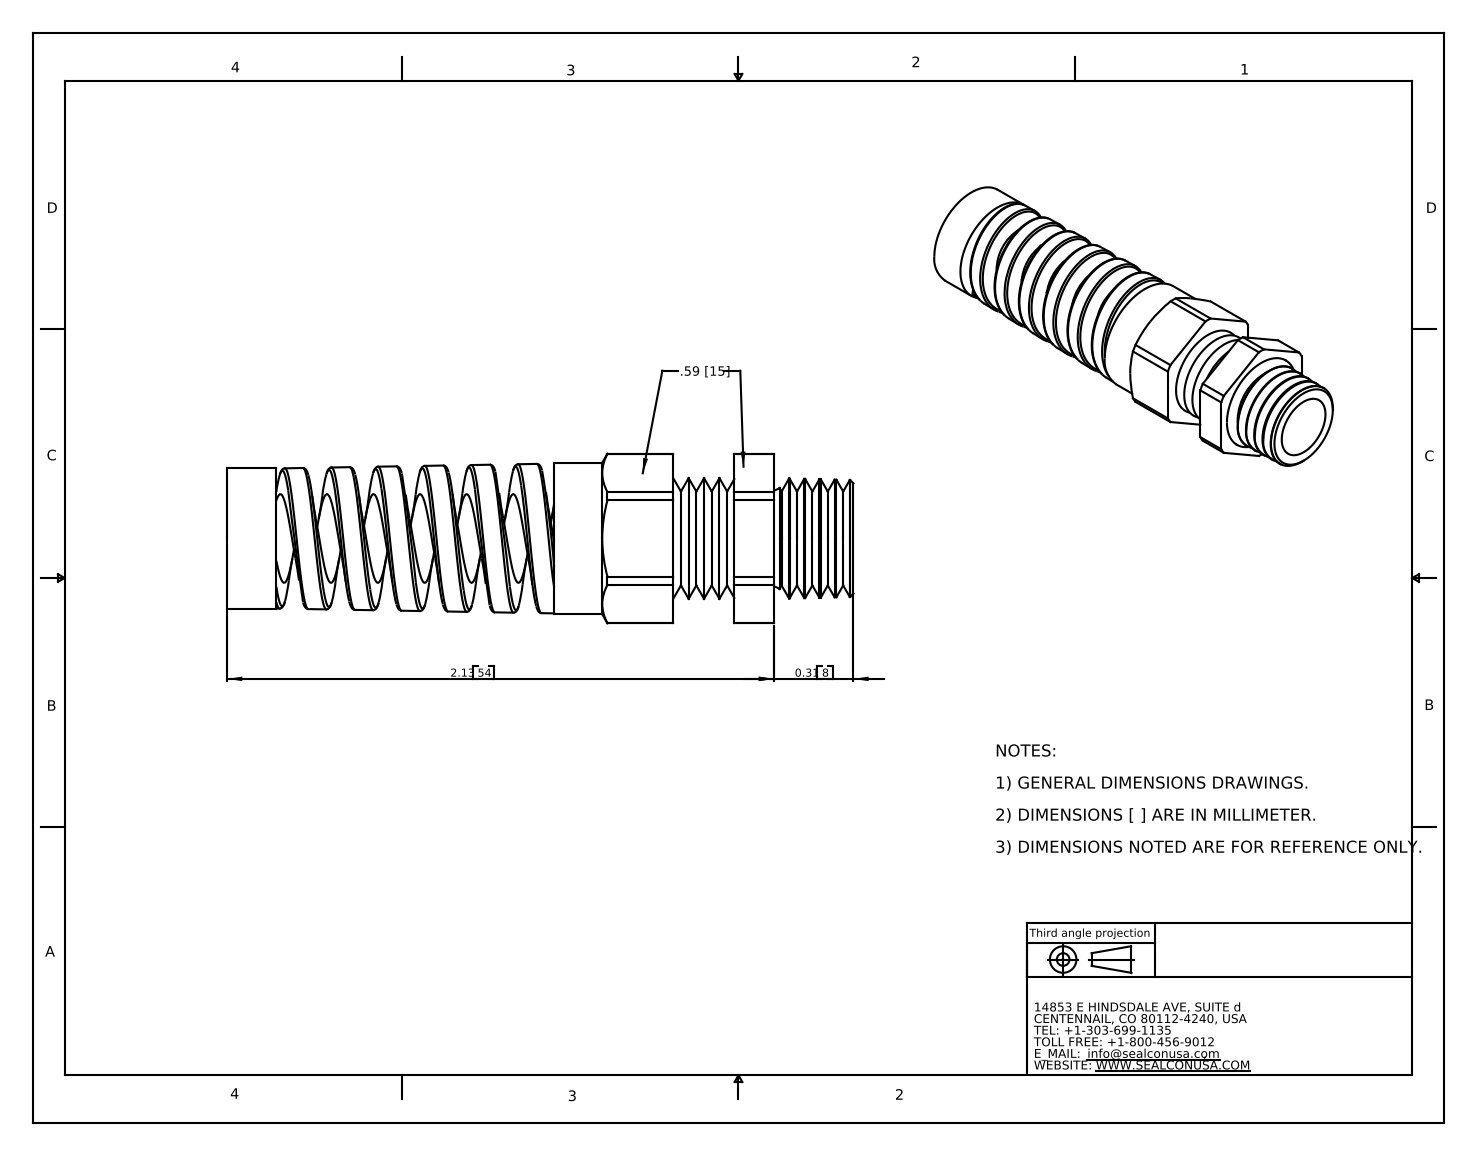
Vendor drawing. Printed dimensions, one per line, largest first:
2.13 54
0.31 8
